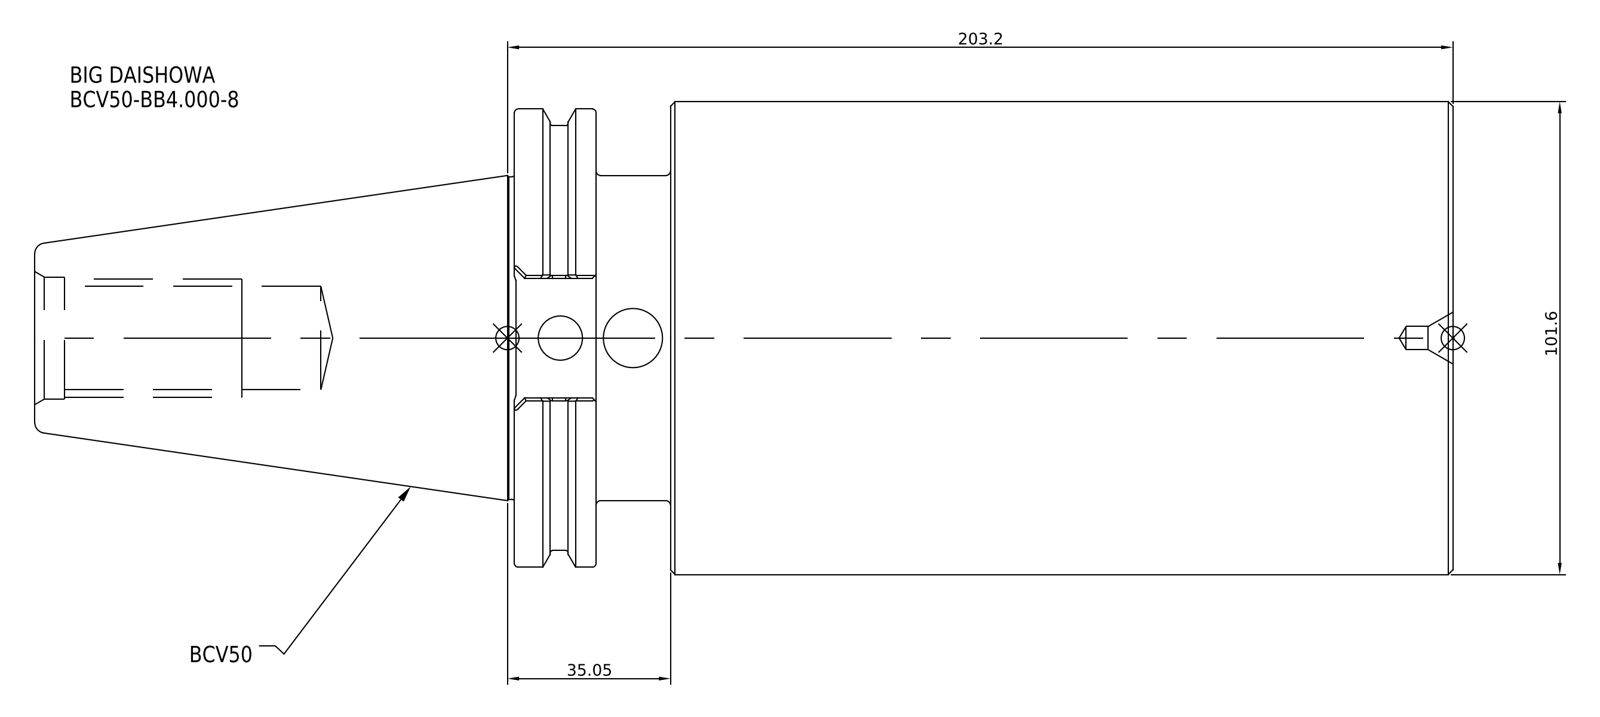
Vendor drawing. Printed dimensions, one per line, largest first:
203.2
101.6
35.05
